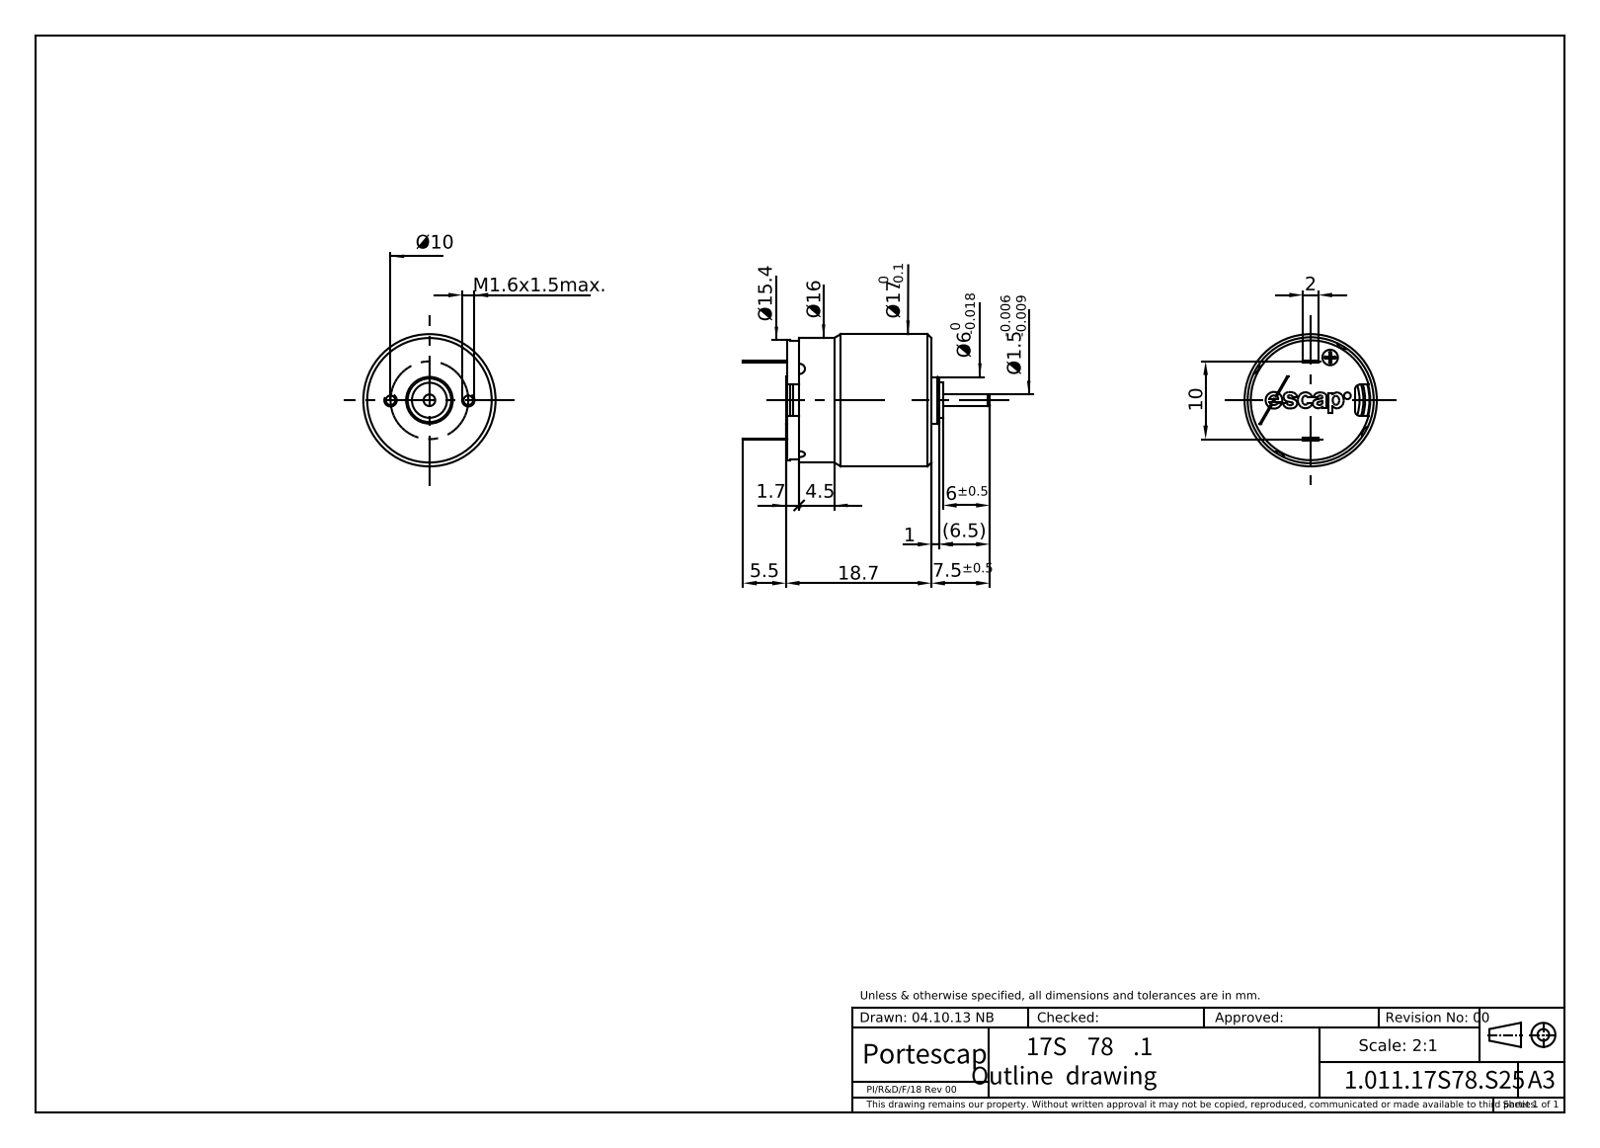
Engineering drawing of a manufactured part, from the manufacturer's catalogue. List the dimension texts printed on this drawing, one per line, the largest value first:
18.7
10
7.5±0.5
(6.5)
6±0.5
5.5
2
M1.6x1.5max.
1
